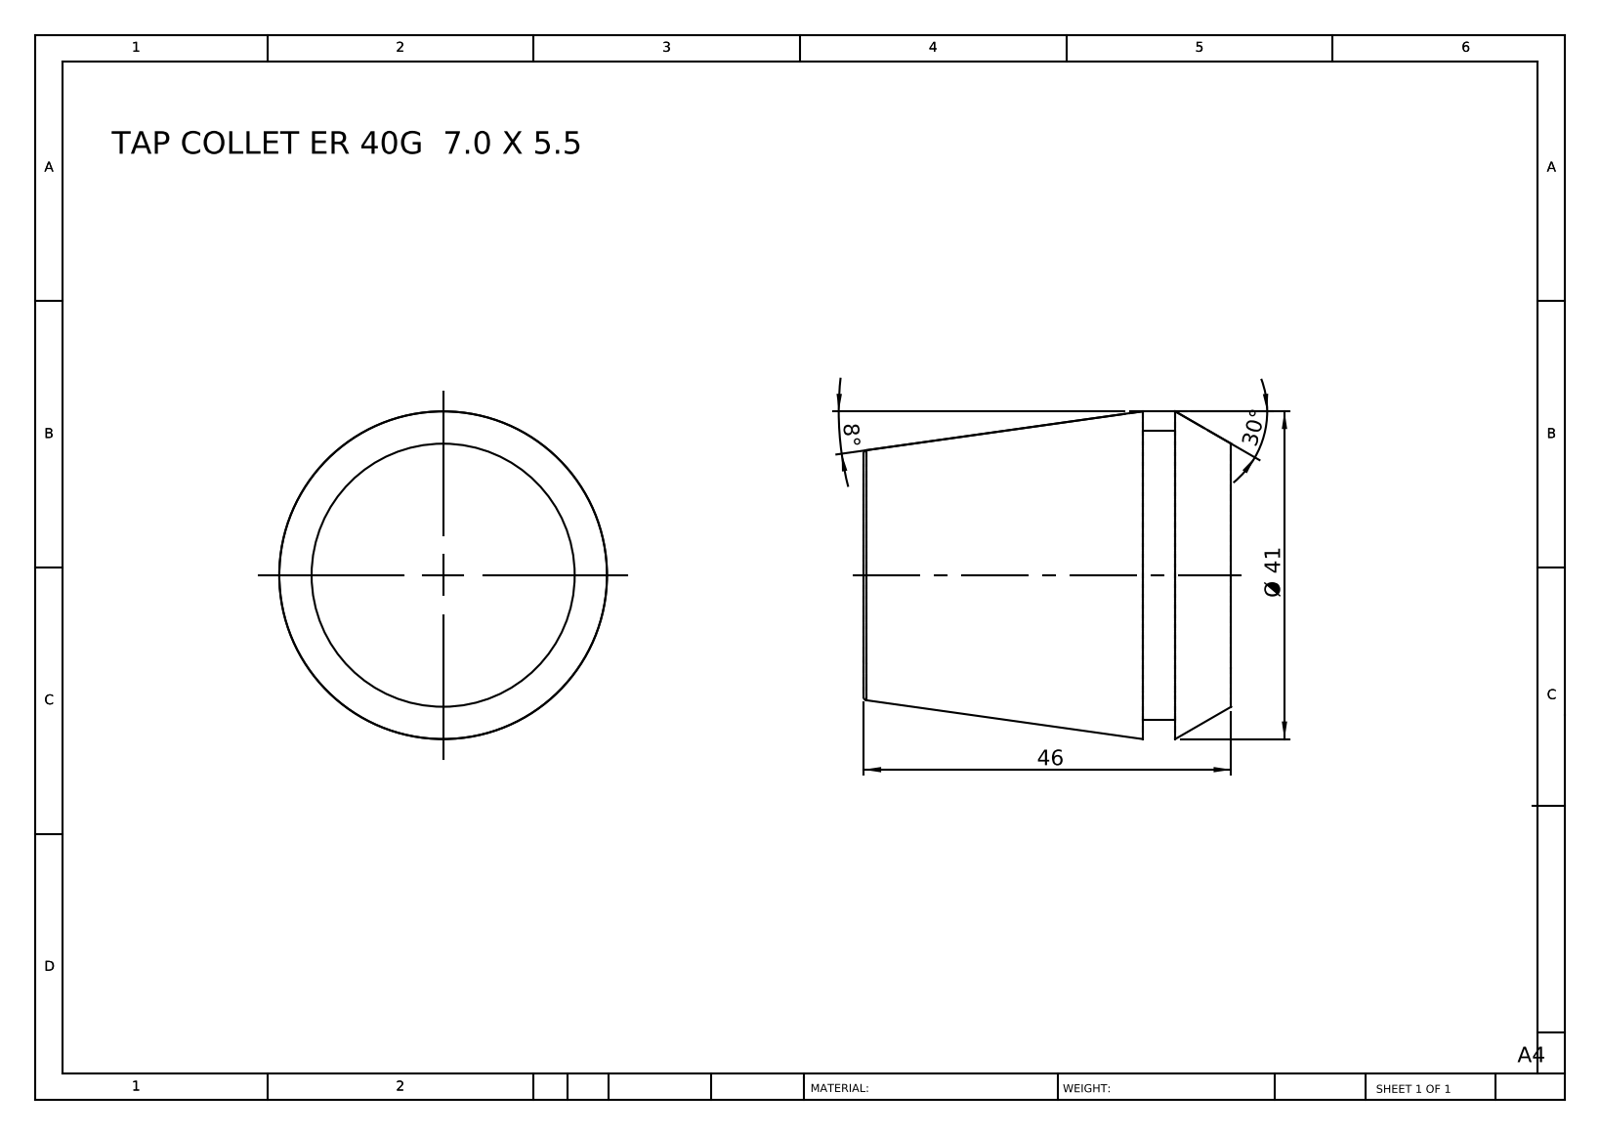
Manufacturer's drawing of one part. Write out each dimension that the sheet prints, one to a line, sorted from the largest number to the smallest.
46
Ø 41
30°
8°
